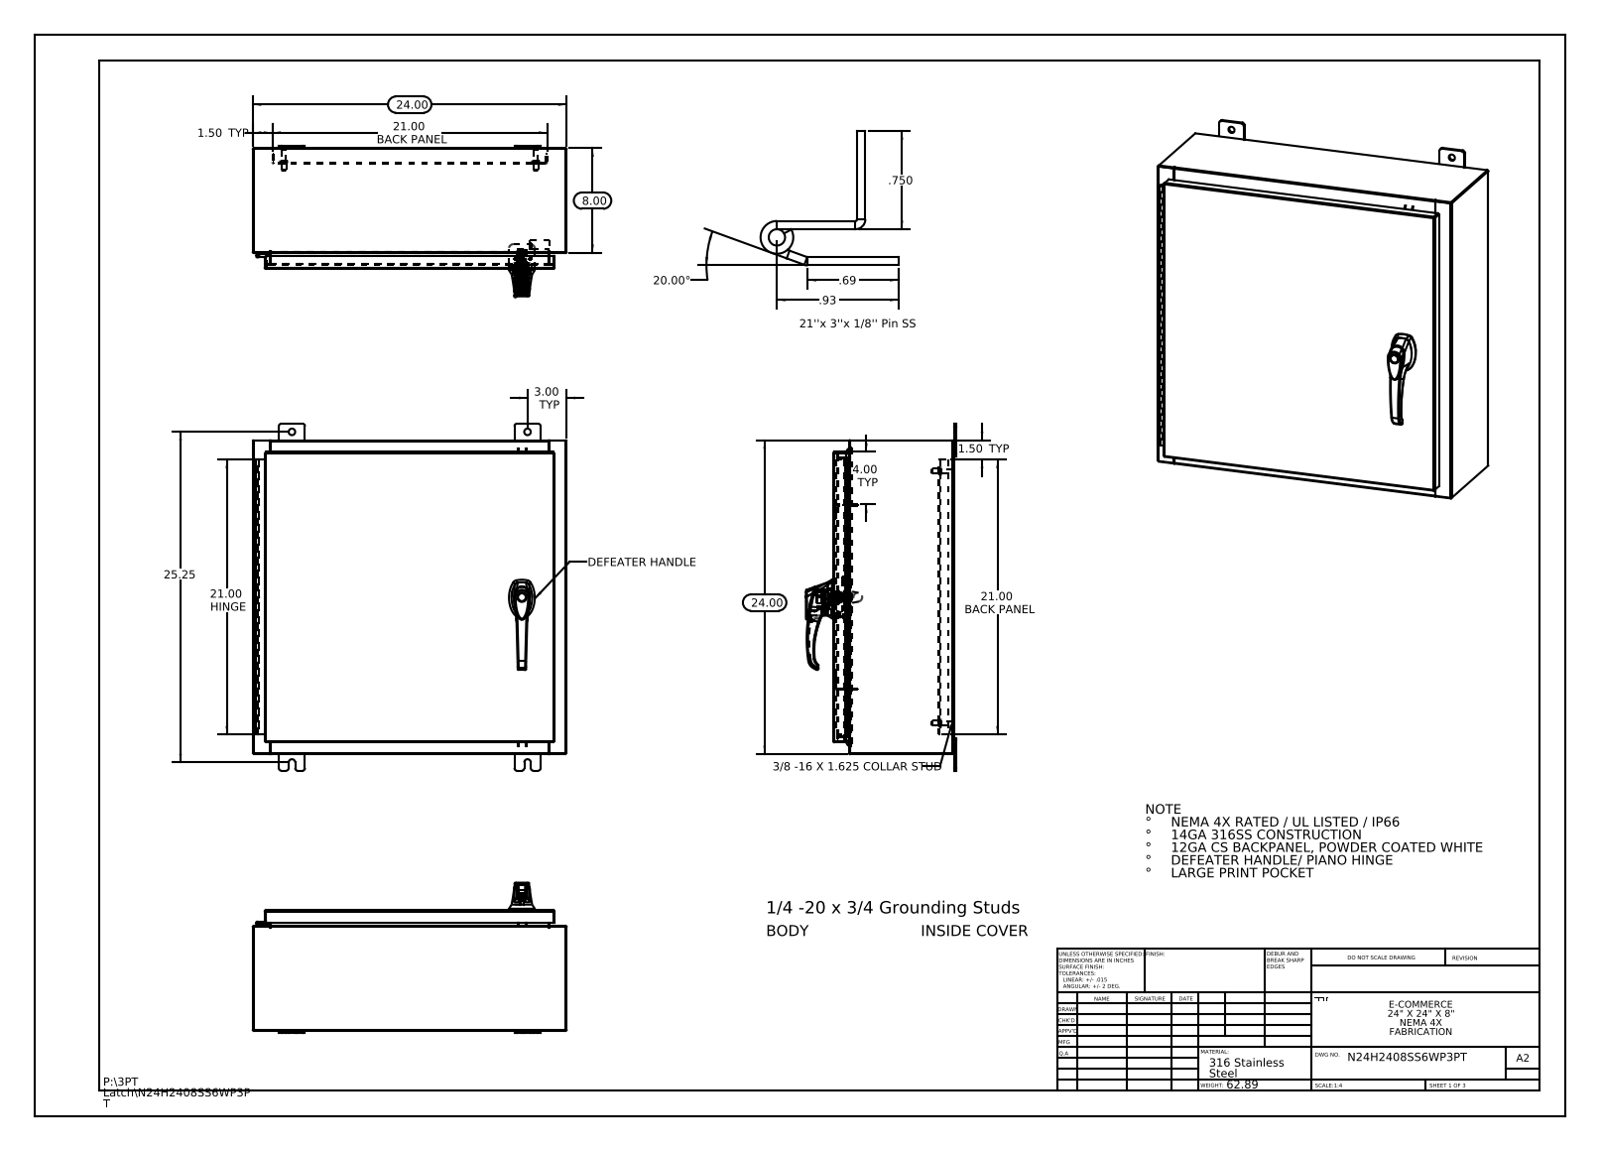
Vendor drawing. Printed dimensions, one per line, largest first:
25.25
24.00
24.00
21.00 HINGE
21.00 BACK PANEL
21.00 BACK PANEL
20.00°
8.00
4.00 TYP
3.00 TYP
1.50 TYP
1.50 TYP
.93
.750
.69
